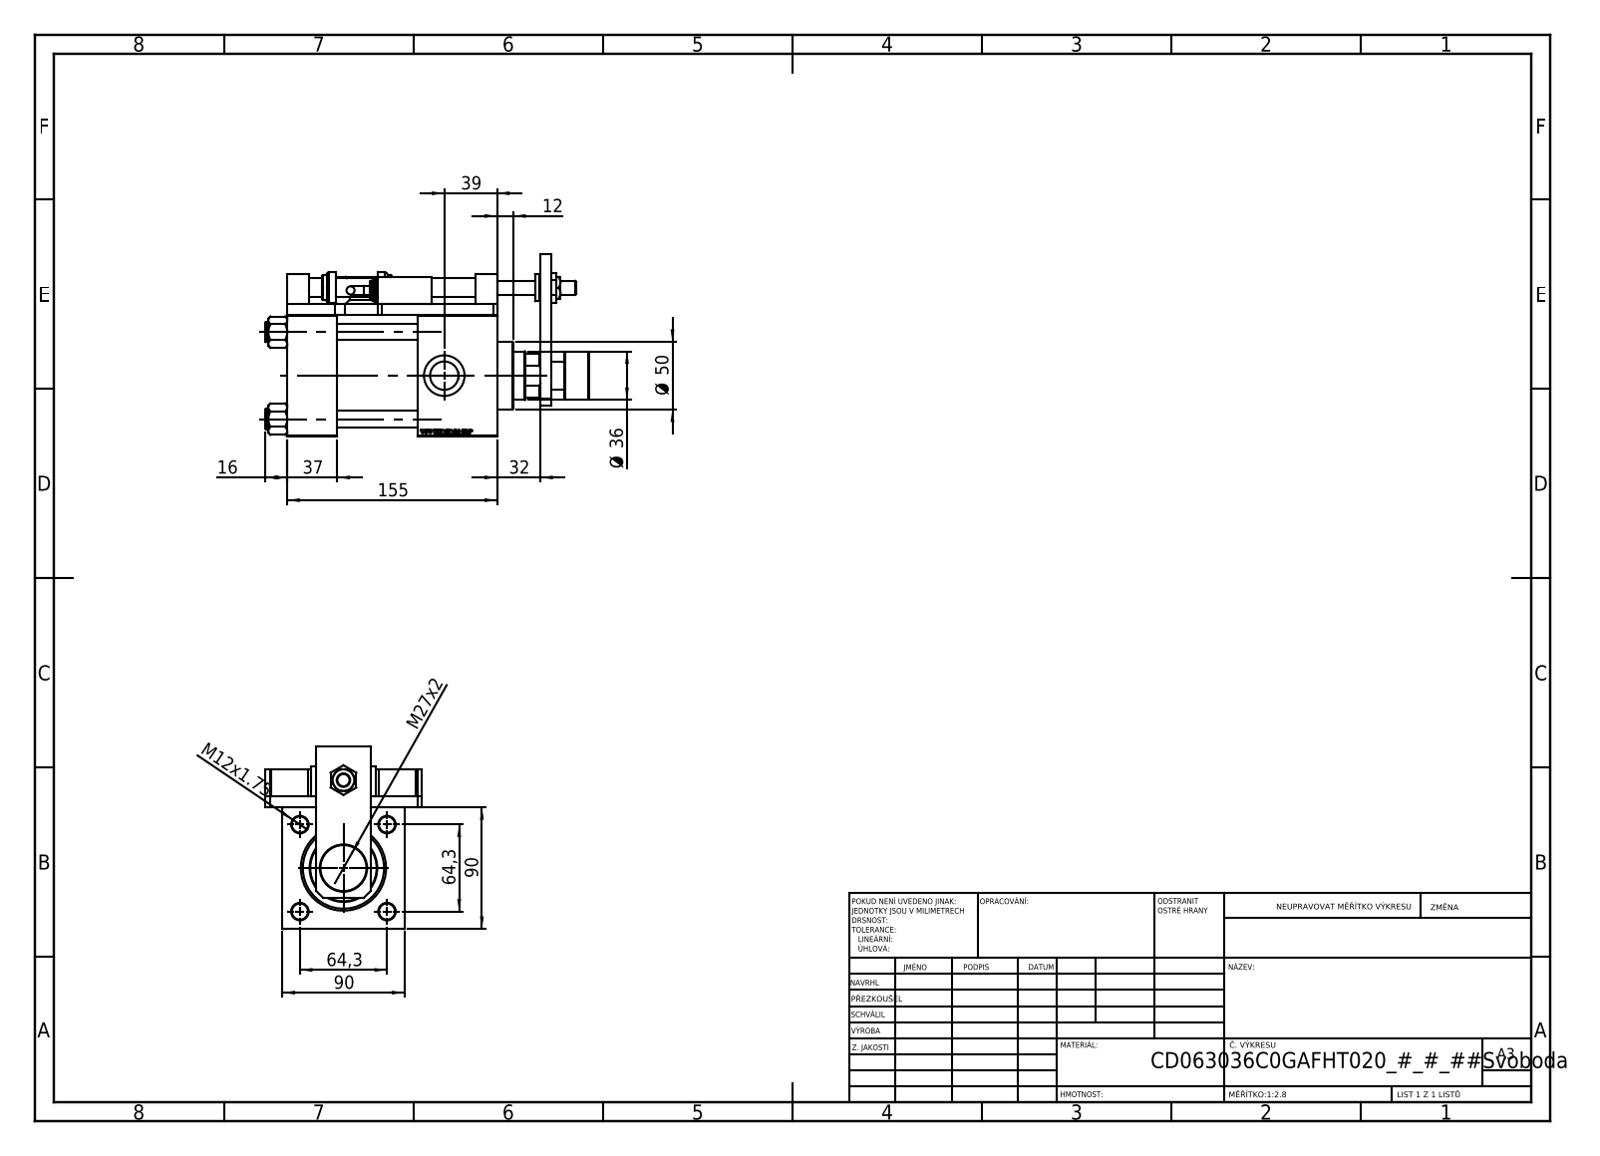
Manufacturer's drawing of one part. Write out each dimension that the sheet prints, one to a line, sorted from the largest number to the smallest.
155
90
90
64,3
64,3
Ø 50
39
37
Ø 36
32
M27x2
16
12
M12x1.75
